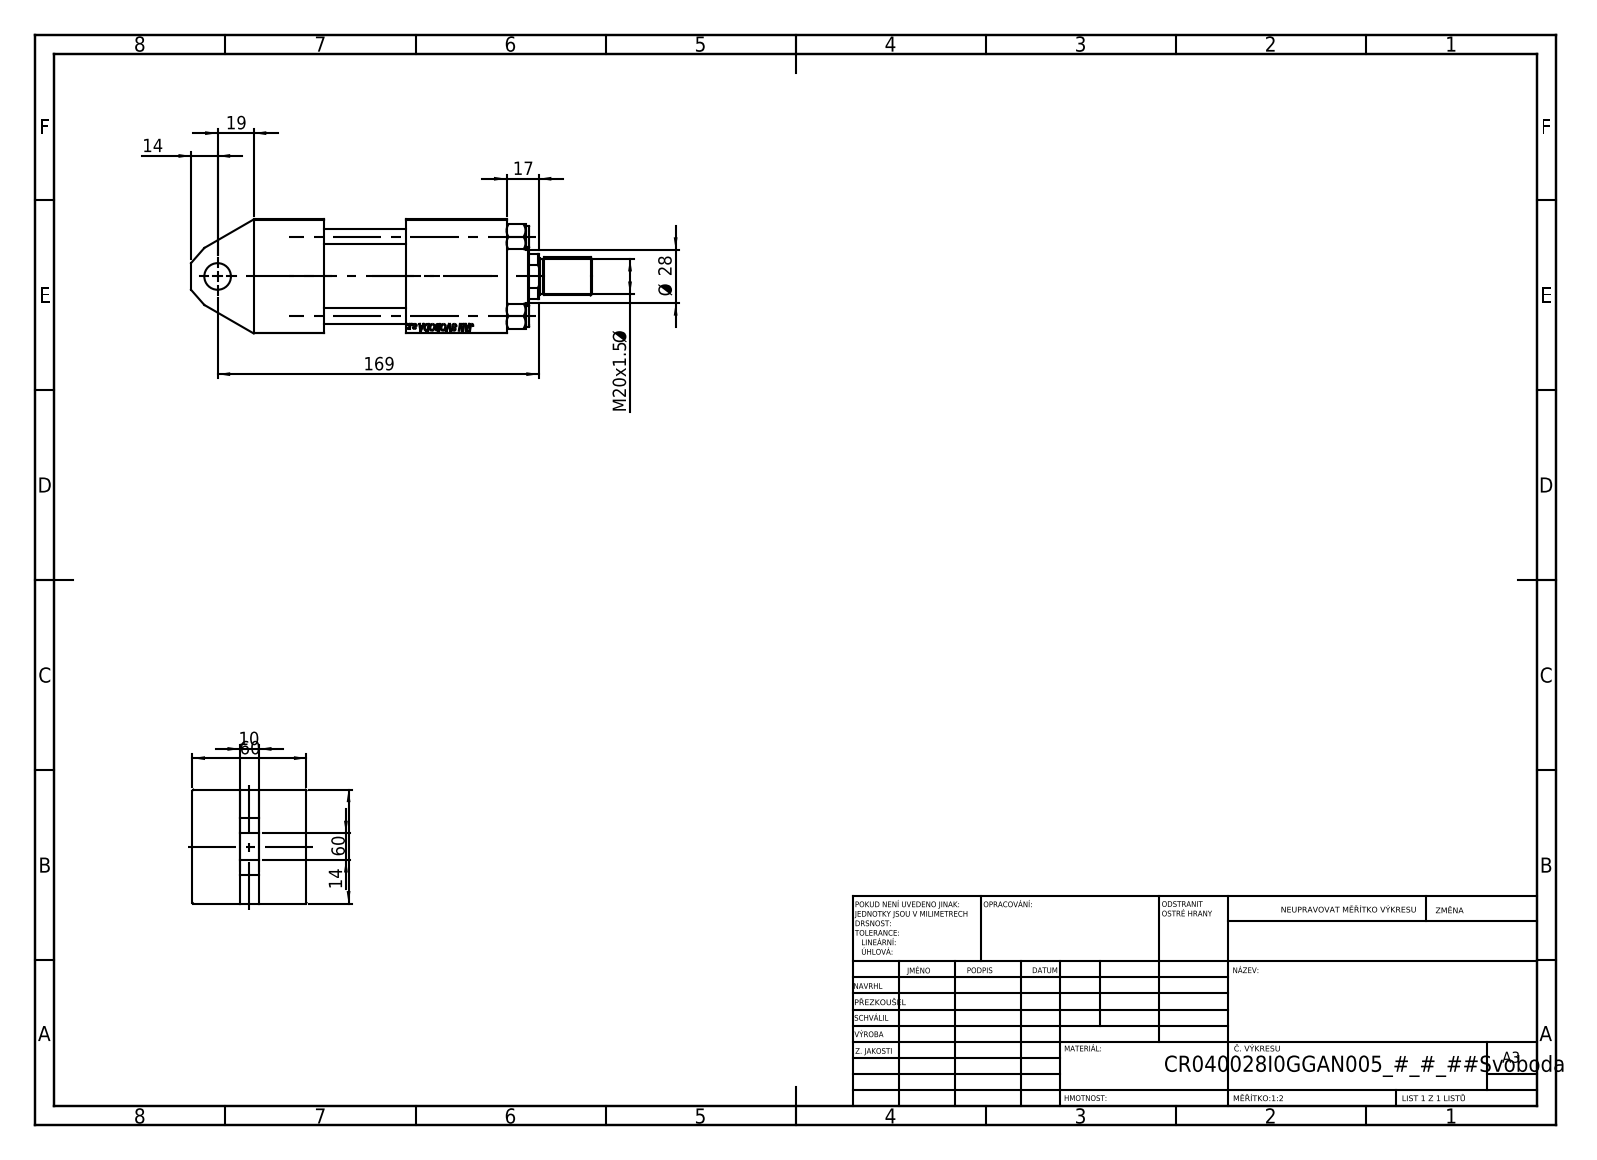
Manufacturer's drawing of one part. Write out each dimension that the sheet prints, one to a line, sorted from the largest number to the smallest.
169
60
60
Ø 28
M20x1.5 Ø
19
17
14
14
10
